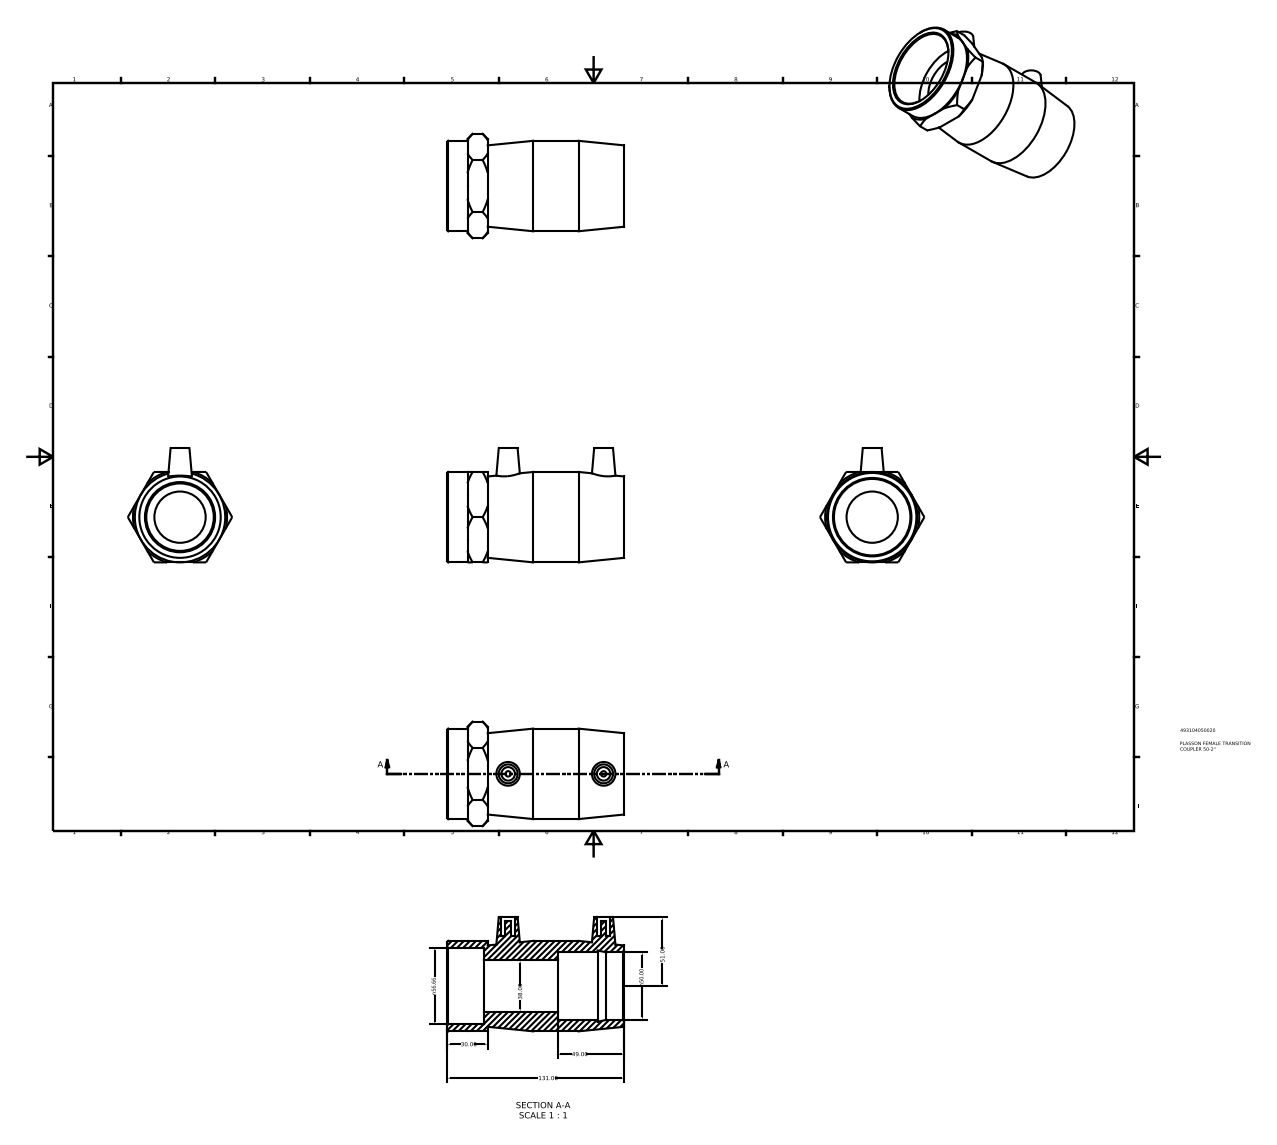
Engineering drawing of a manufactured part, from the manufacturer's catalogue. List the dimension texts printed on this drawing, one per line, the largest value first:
131.00
n56.66
51.00
n50.00
49.00
38.00
30.00
